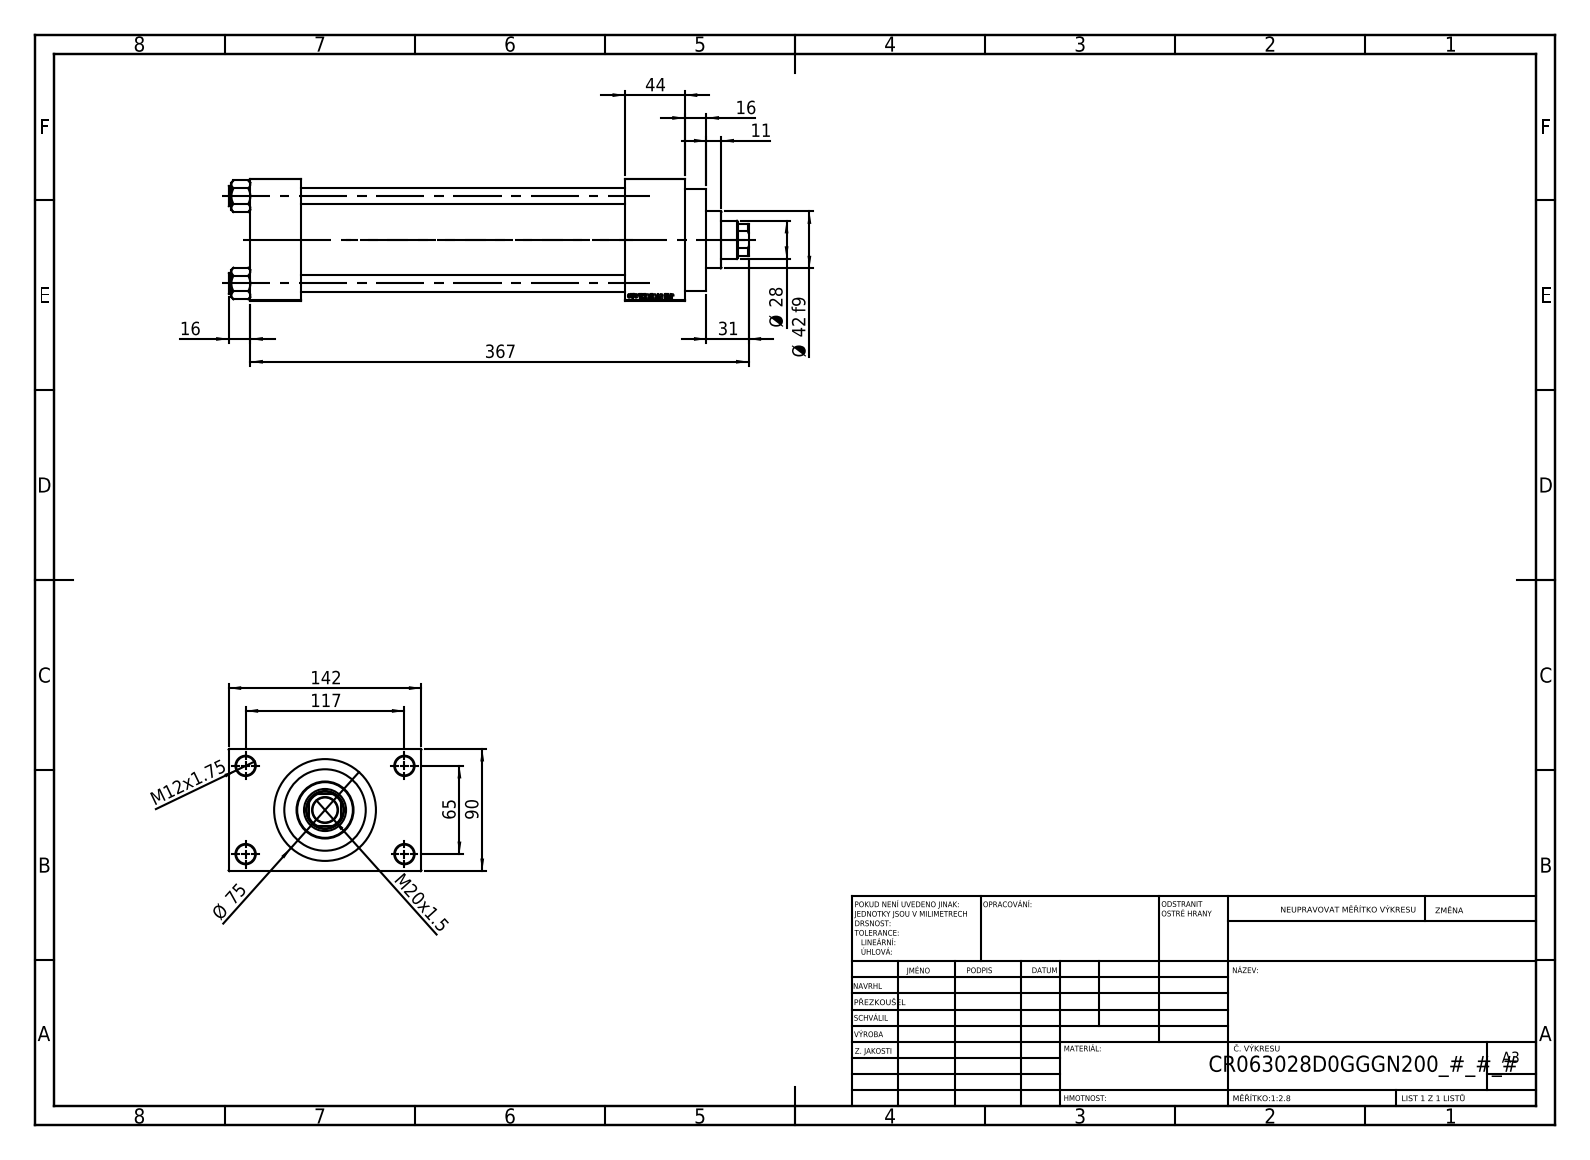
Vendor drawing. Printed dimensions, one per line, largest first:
367
142
117
90
Ø 75
65
44
Ø 42 f9
31
Ø 28
M20x1.5
16
16
M12x1.75
11
